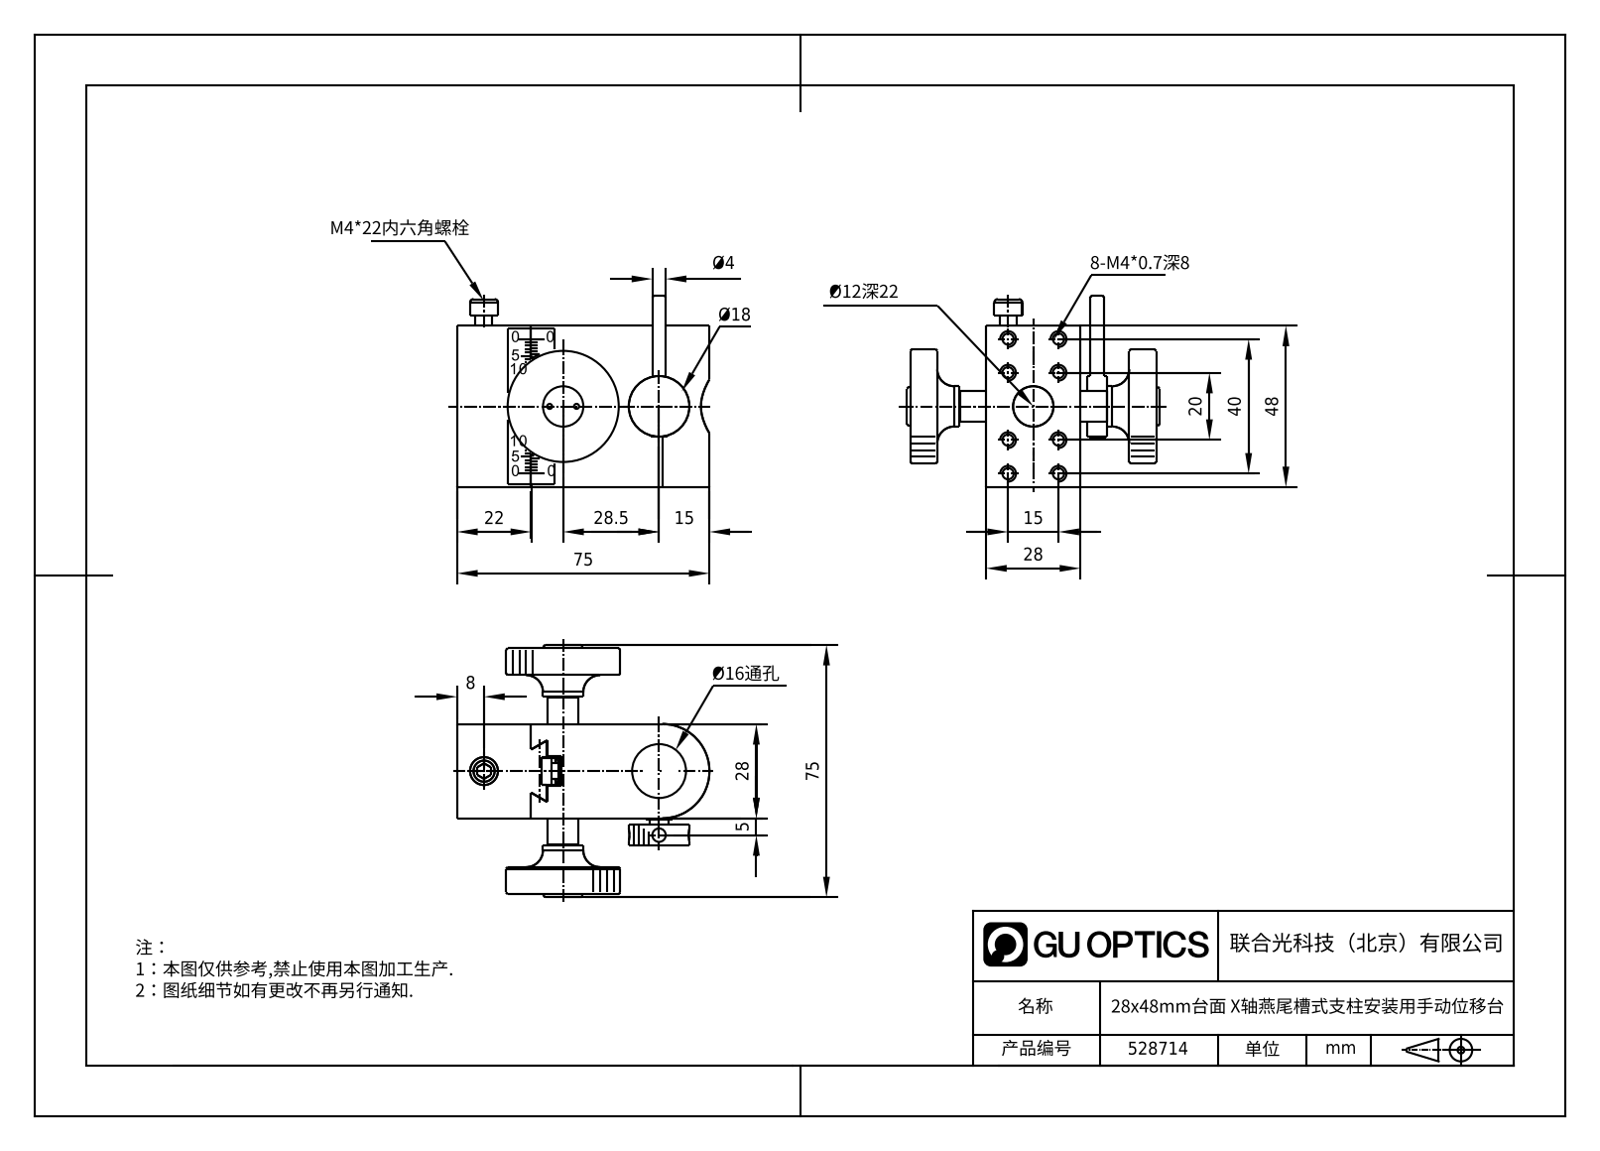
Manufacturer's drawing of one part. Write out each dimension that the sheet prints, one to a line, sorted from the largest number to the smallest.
75
75
48
40
28.5
28
28
22
20
15
15
8
5
Ø4
